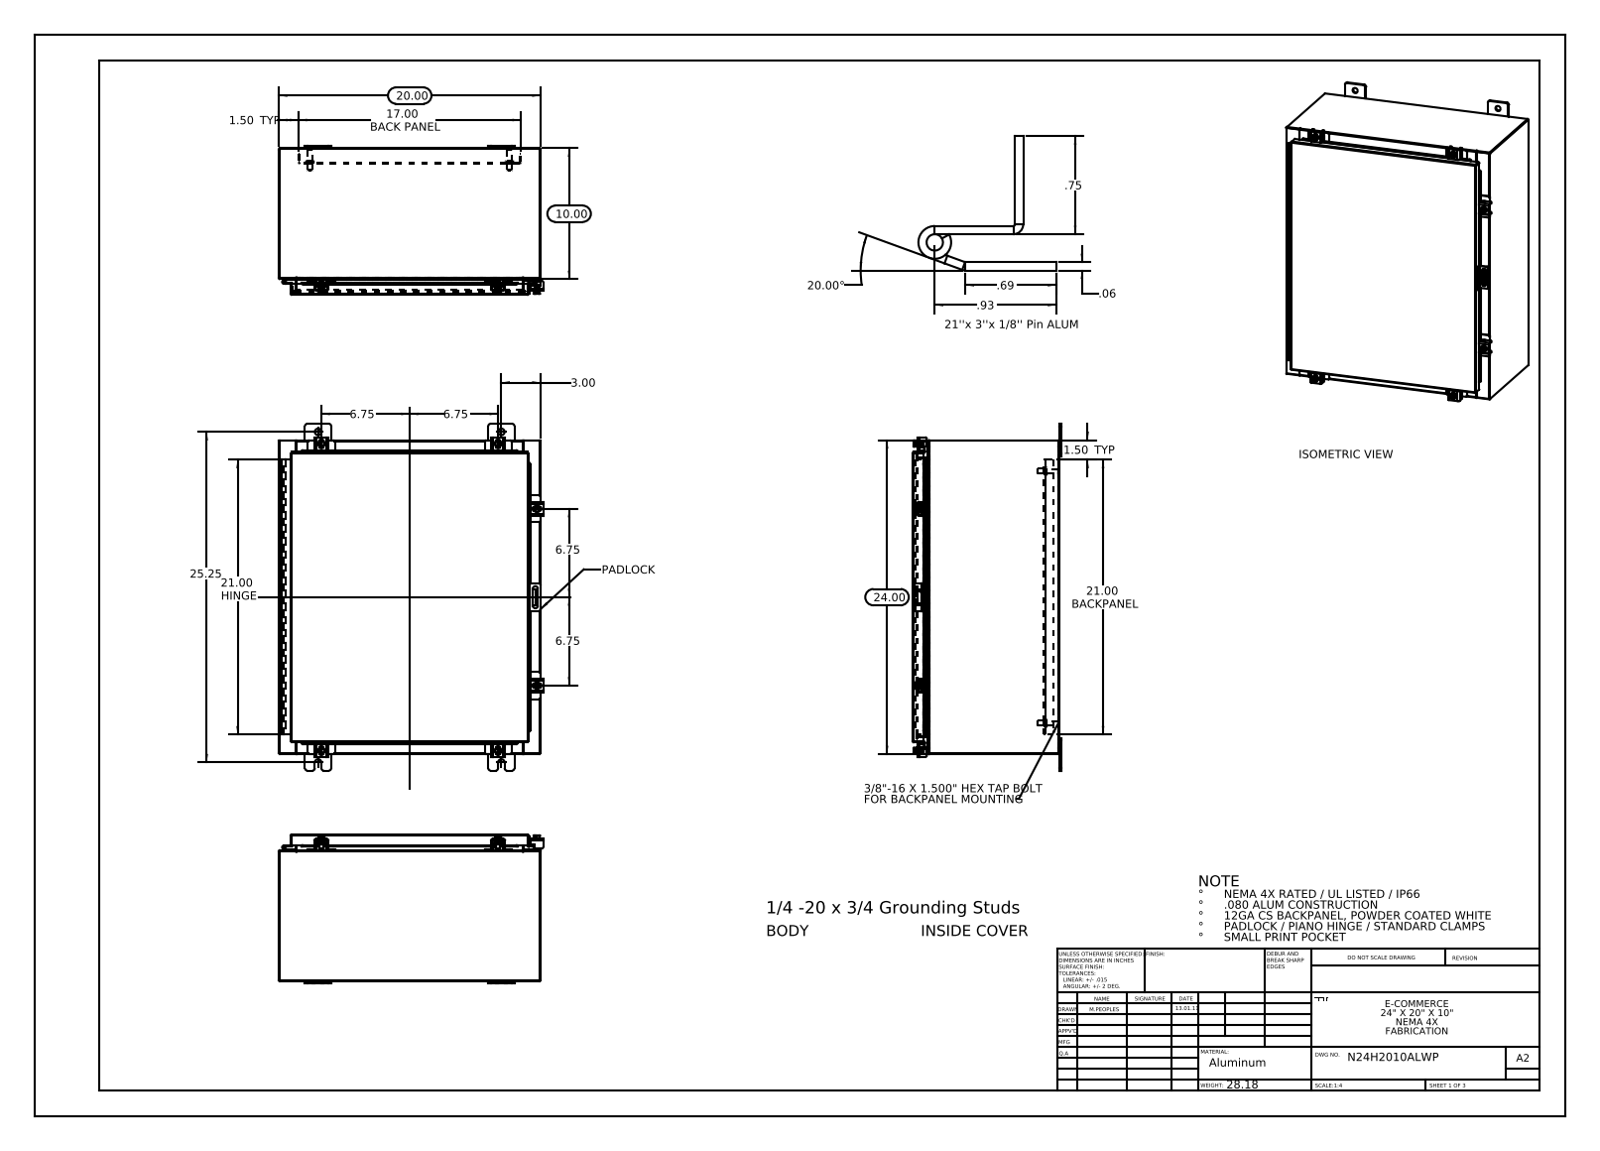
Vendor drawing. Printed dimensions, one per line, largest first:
25.25
24.00
21.00 HINGE
21.00 BACKPANEL
20.00
20.00°
17.00 BACK PANEL
10.00
6.75
6.75
6.75
6.75
3.00
1.50 TYP
1.50 TYP
.93
.75
.69
.06
